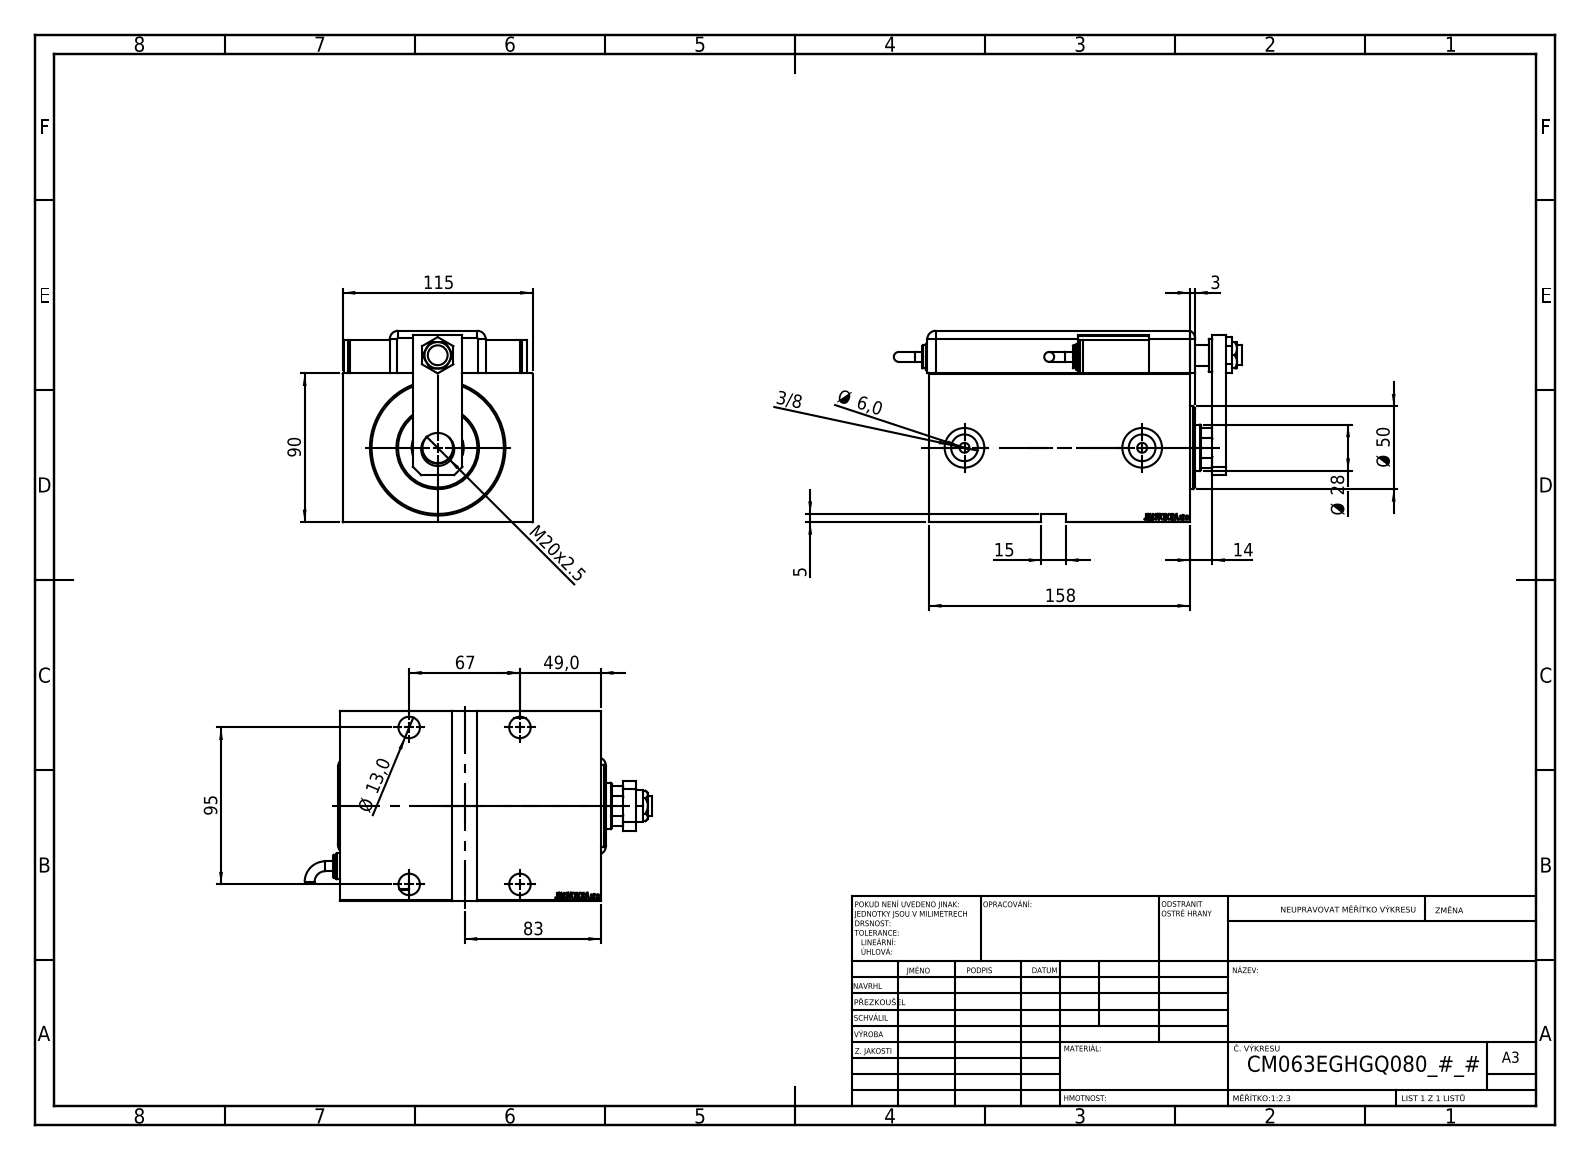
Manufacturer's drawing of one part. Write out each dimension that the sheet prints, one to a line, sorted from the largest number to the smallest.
158
115
95
90
83
67
Ø 50
49,0
Ø 28
M20x2.5
15
14
Ø 13,0
Ø 6,0
5
3
3/8
